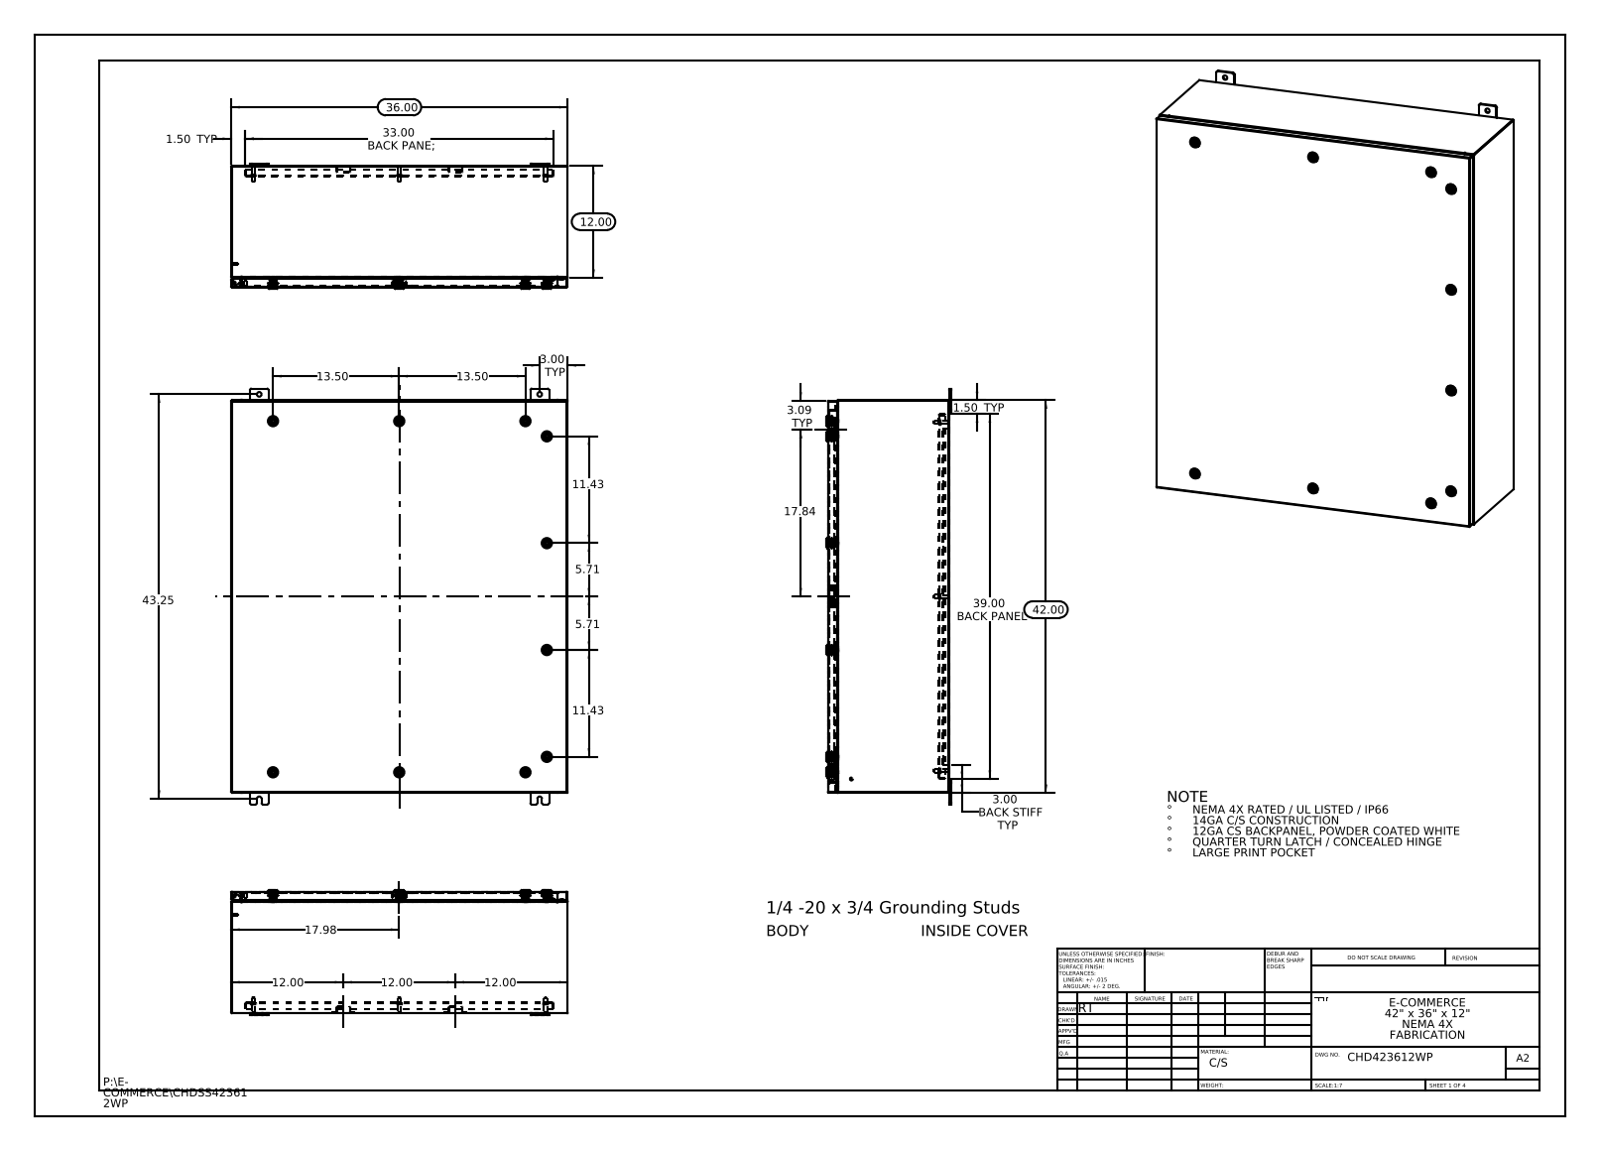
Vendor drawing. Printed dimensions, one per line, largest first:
43.25
42.00
39.00 BACK PANEL
36.00
33.00 BACK PANE;
17.98
17.84
13.50
13.50
12.00
12.00
12.00
12.00
11.43
11.43
5.71
5.71
3.09 TYP
3.00 TYP
3.00 BACK STIFF TYP
1.50 TYP
1.50 TYP
